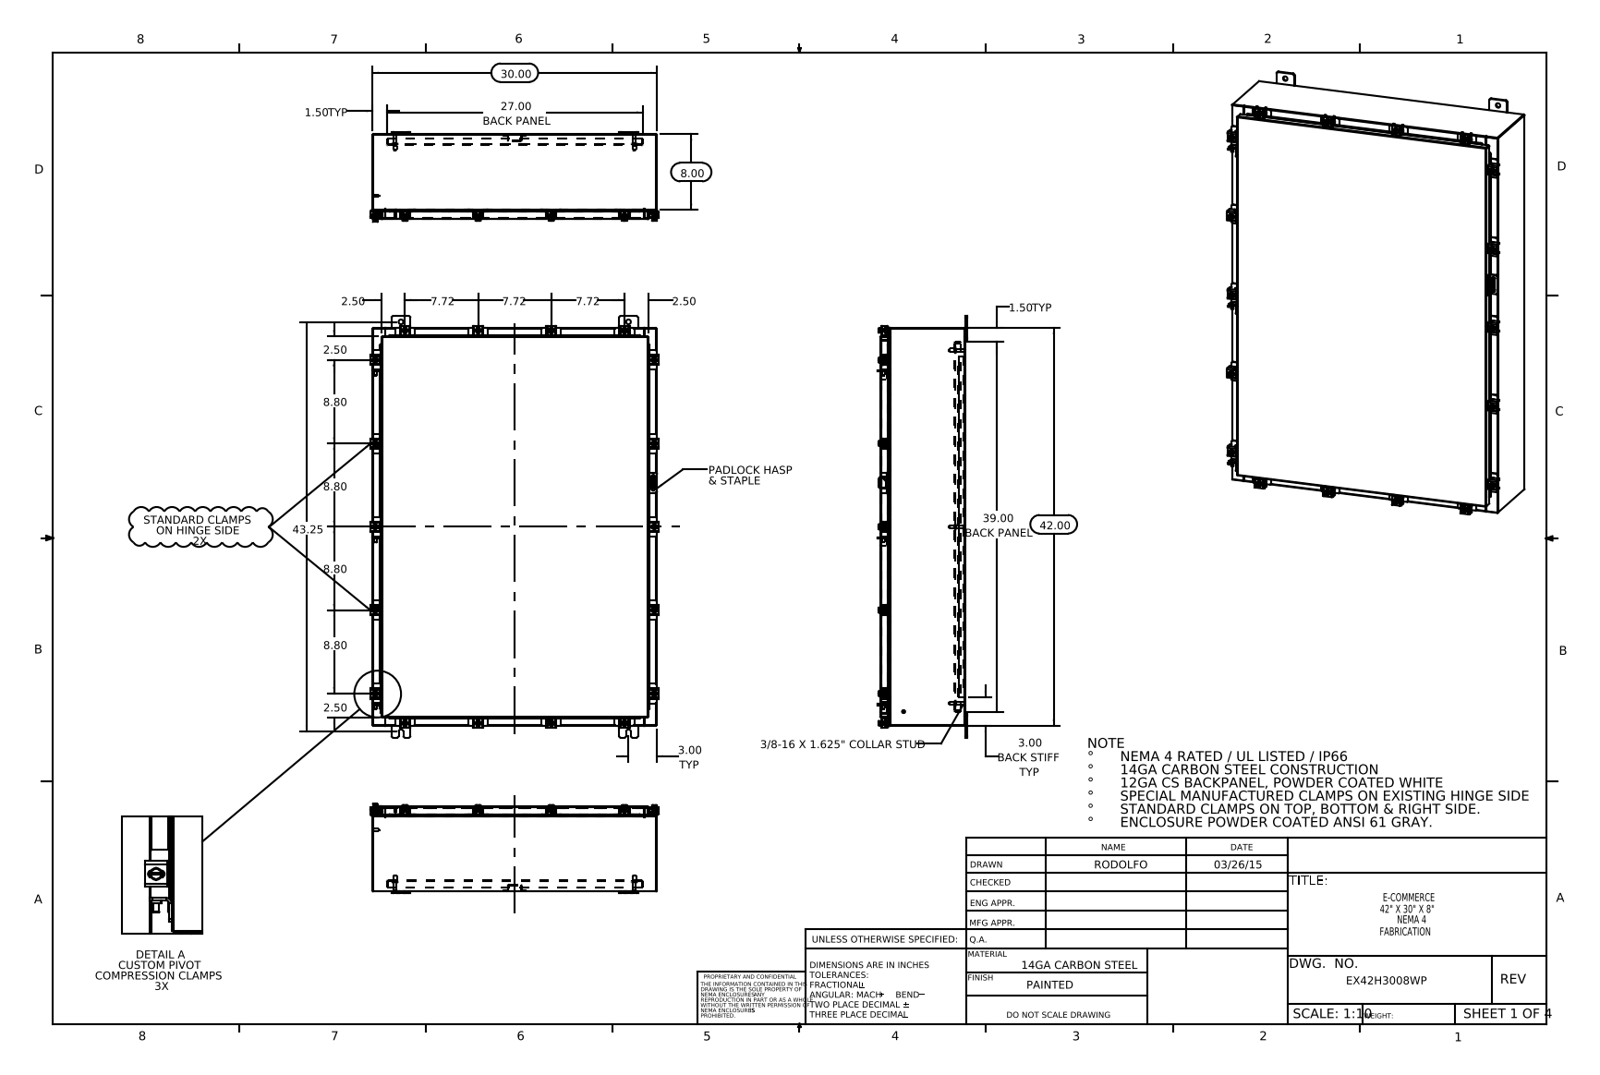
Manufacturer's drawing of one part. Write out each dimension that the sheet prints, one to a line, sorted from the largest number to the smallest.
43.25
42.00
39.00 BACK PANEL
30.00
27.00 BACK PANEL
8.80
8.80
8.80
8.80
8.00
7.72
7.72
7.72
3.00 TYP
3.00 BACK STIFF TYP
2.50
2.50
2.50
2.50
1.50 TYP
1.50 TYP
